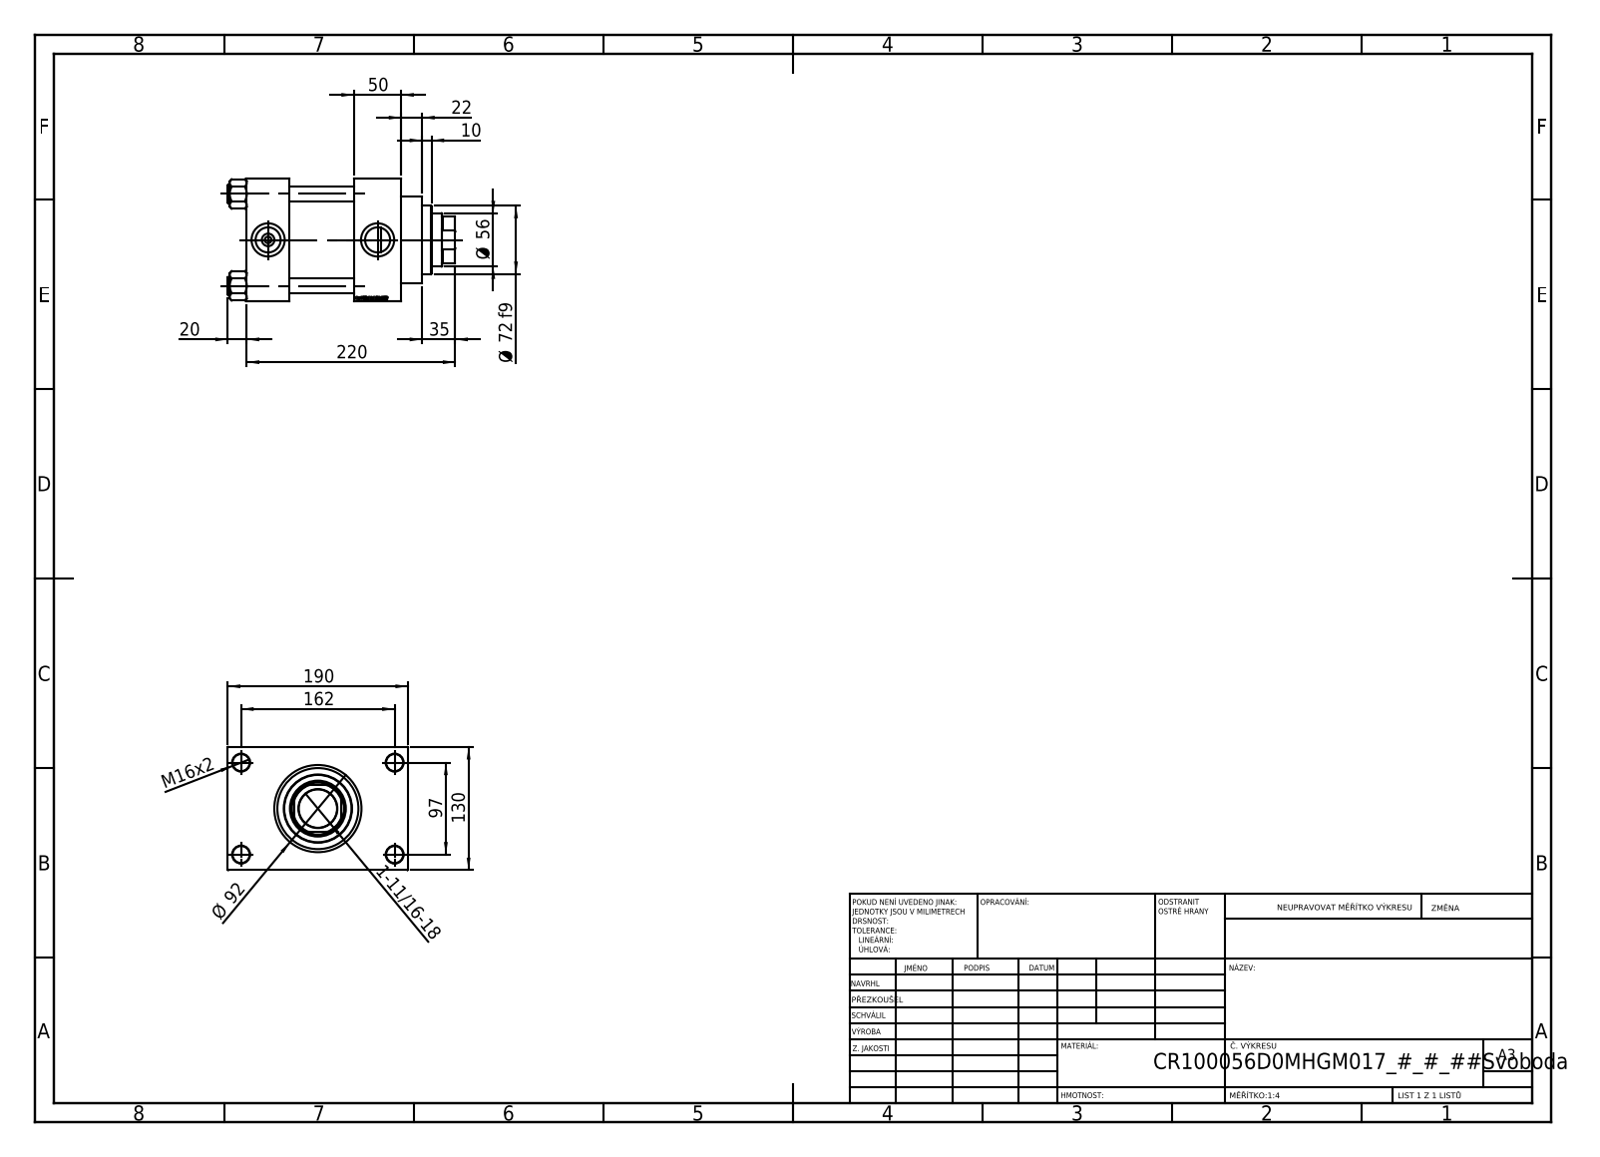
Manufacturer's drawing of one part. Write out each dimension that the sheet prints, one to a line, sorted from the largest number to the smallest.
220
190
162
130
97
Ø 92
Ø 72 f9
Ø 56
50
35
22
20
M16x2
10
1-11/16-18
